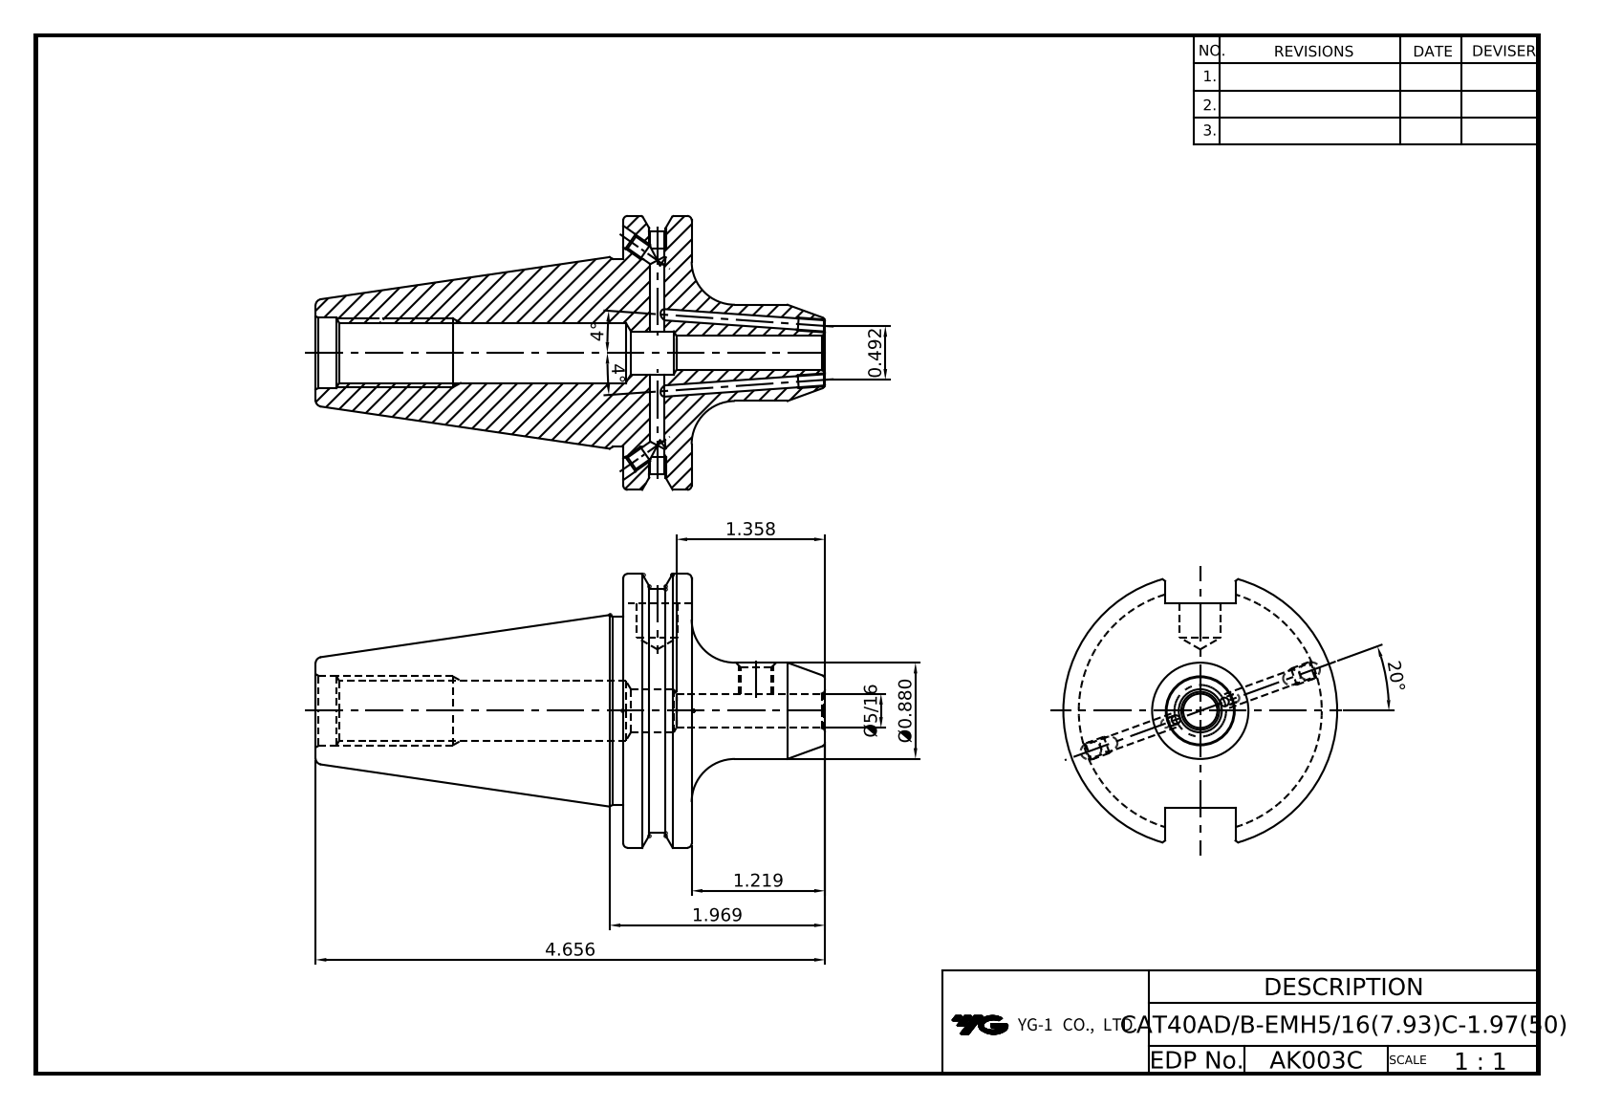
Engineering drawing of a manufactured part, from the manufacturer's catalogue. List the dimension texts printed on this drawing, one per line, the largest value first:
20°
4.656
4°
4°
1.969
1.358
1.219
Ø0.880
0.492
Ø5/16
